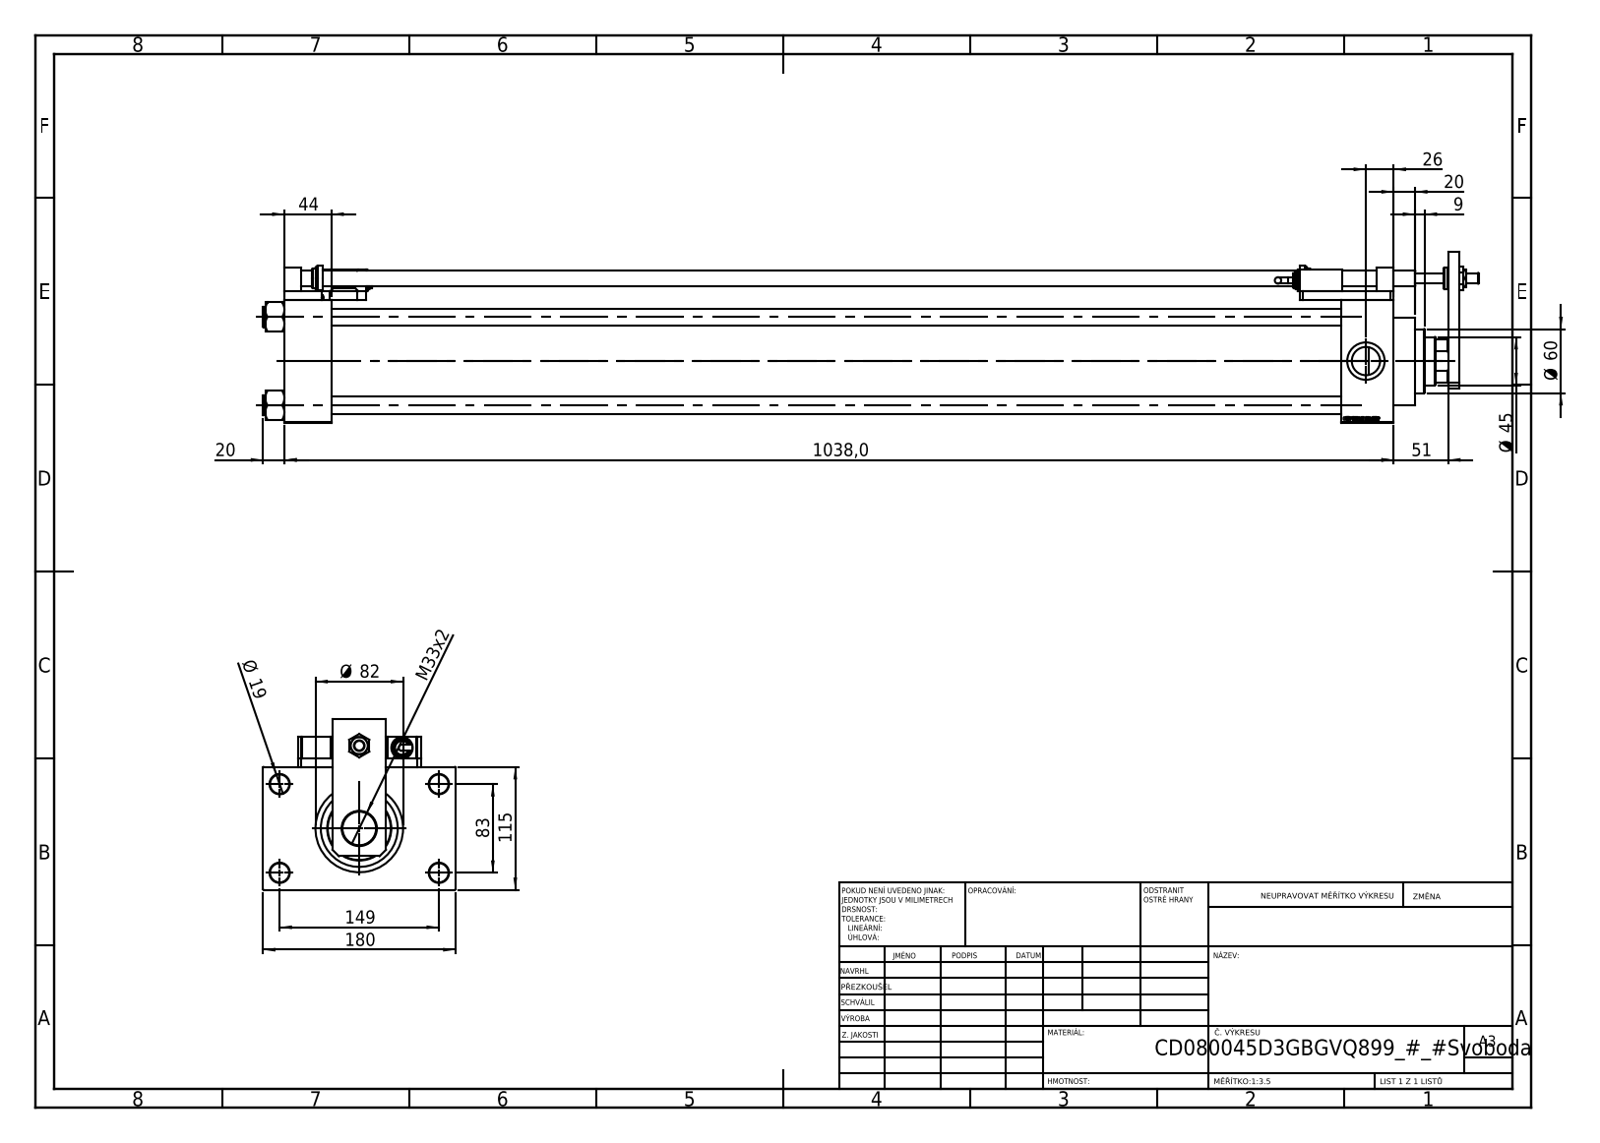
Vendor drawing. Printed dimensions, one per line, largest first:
1038,0
180
149
115
83
Ø 82
Ø 60
51
Ø 45
44
M33x2
26
20
20
Ø 19
9
